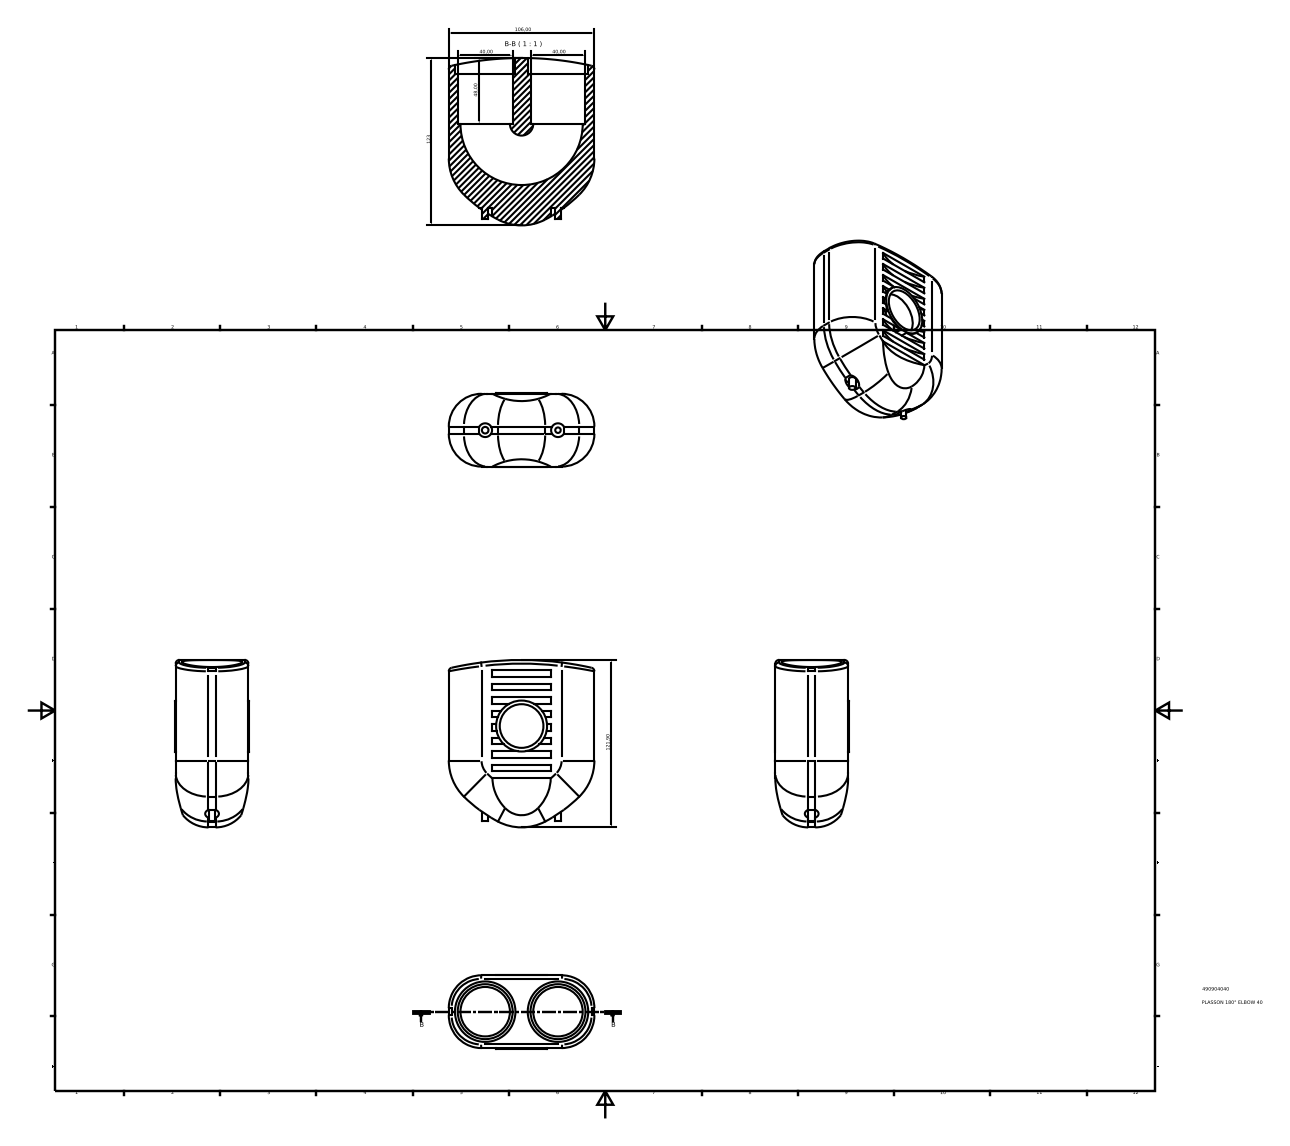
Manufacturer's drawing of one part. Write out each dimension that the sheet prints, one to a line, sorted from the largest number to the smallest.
123
121,90
106,00
48,00
40,00
40,00
